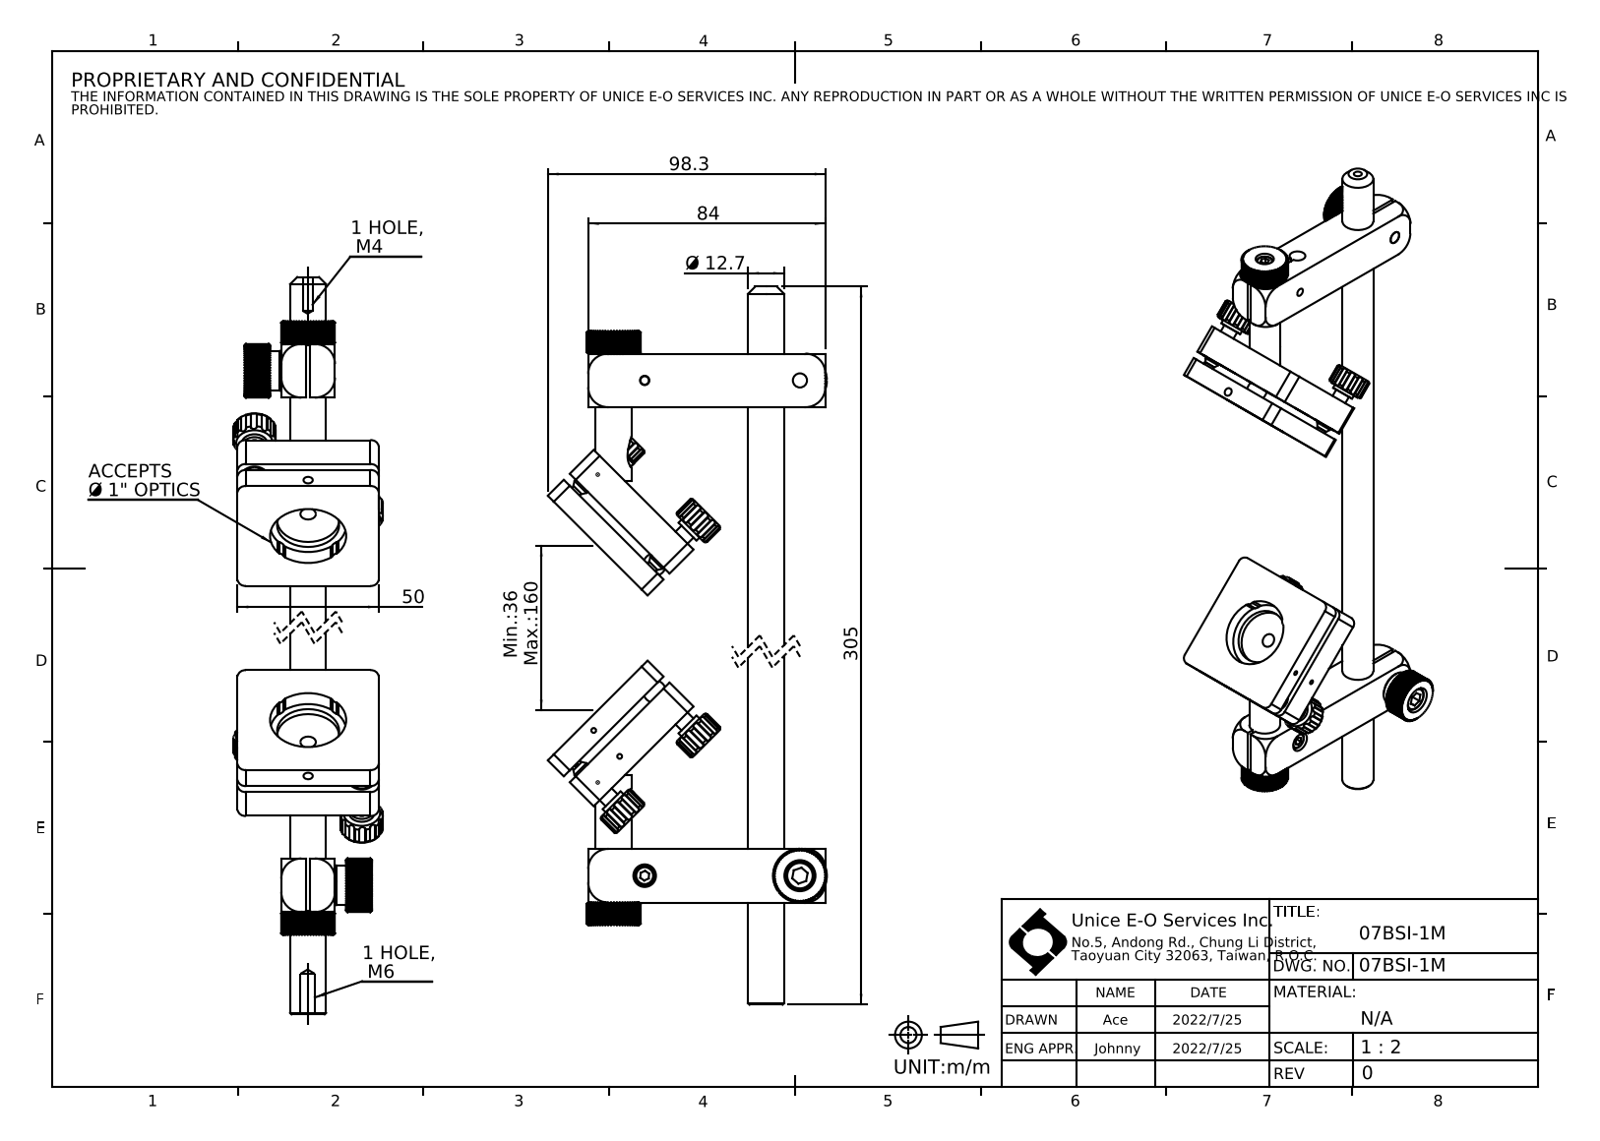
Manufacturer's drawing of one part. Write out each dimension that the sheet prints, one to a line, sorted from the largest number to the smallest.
305
98.3
84
50
Min.:36 Max.:160
Ø 12.7
